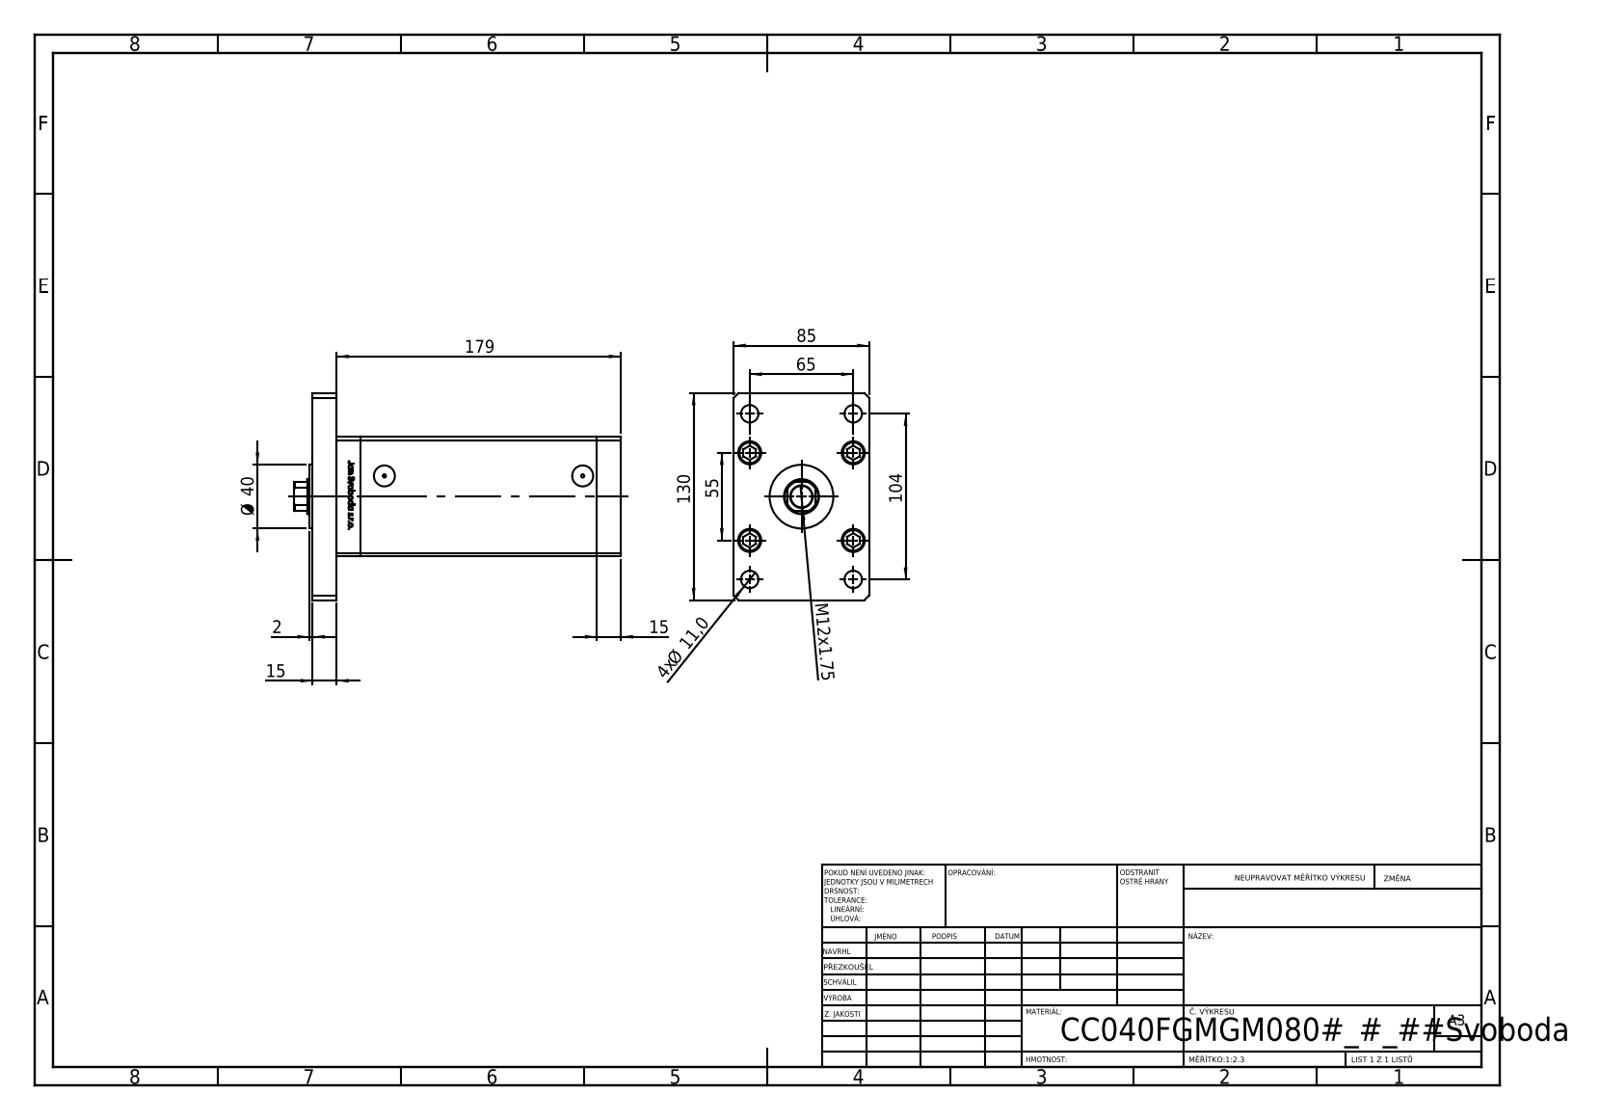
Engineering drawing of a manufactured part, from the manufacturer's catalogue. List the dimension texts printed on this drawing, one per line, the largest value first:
179
130
104
85
65
55
Ø 40
15
15
M12x1.75
4x Ø 11,0
2
